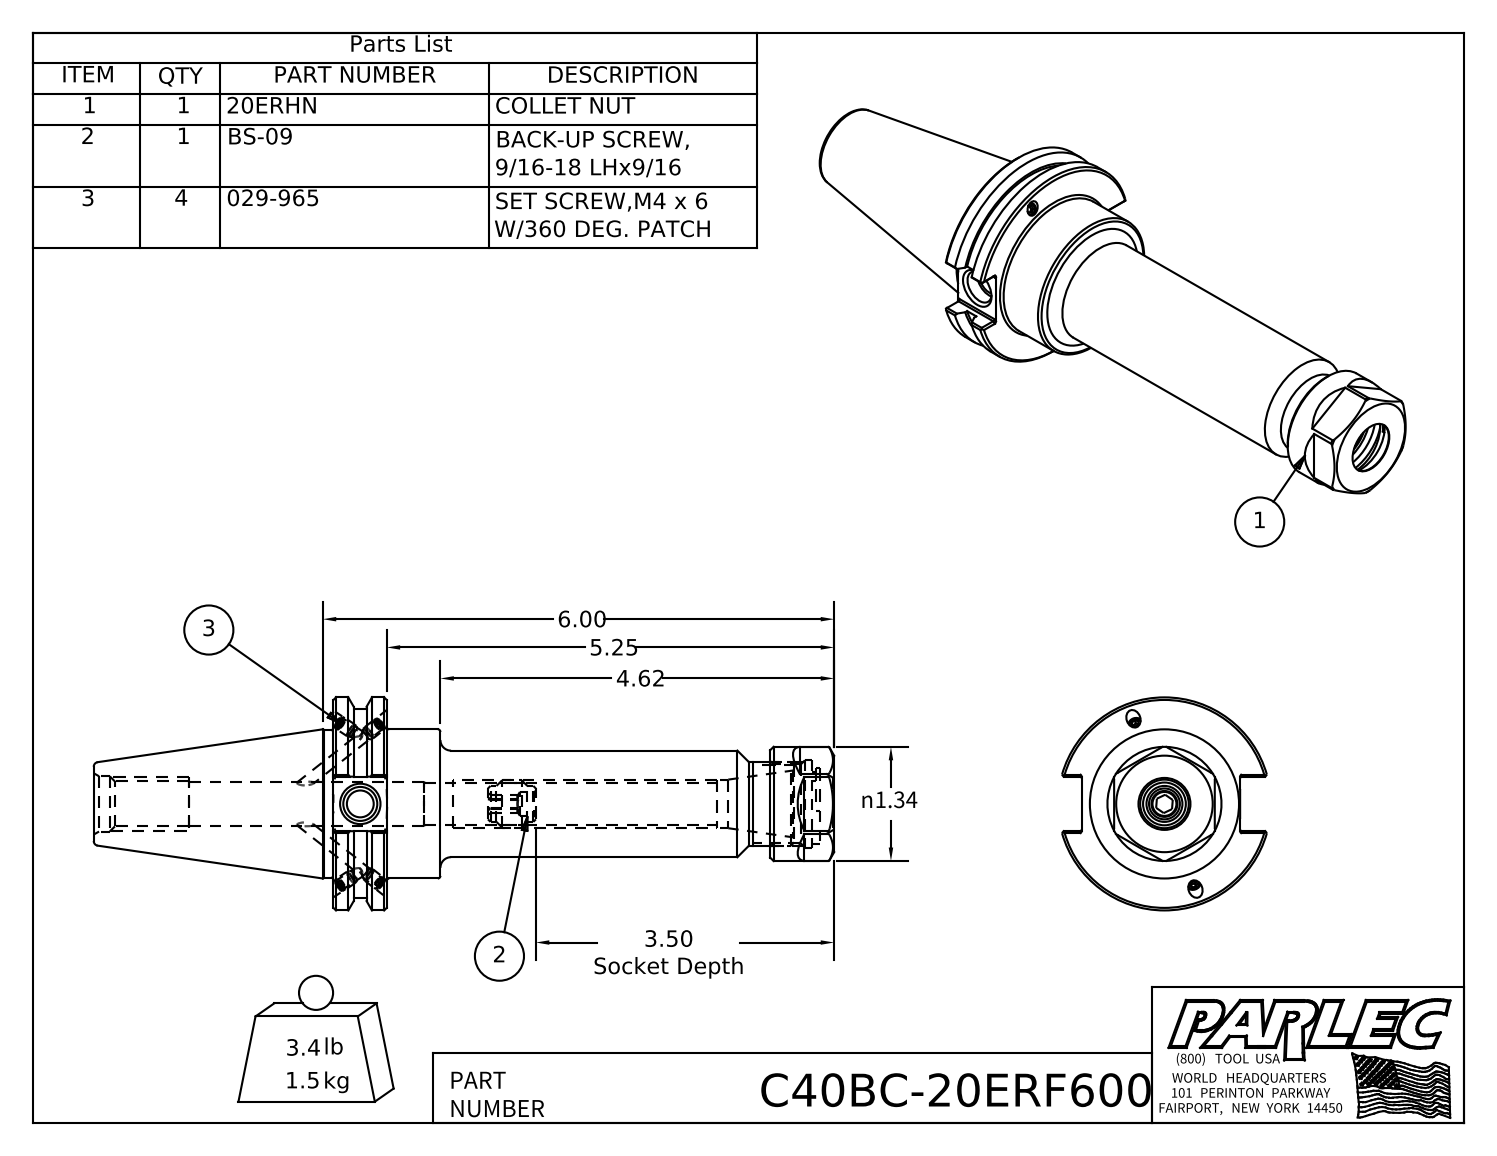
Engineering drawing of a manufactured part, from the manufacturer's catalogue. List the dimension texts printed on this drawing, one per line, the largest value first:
6.00
5.25
4.62
3.50 Socket Depth
n1.34
